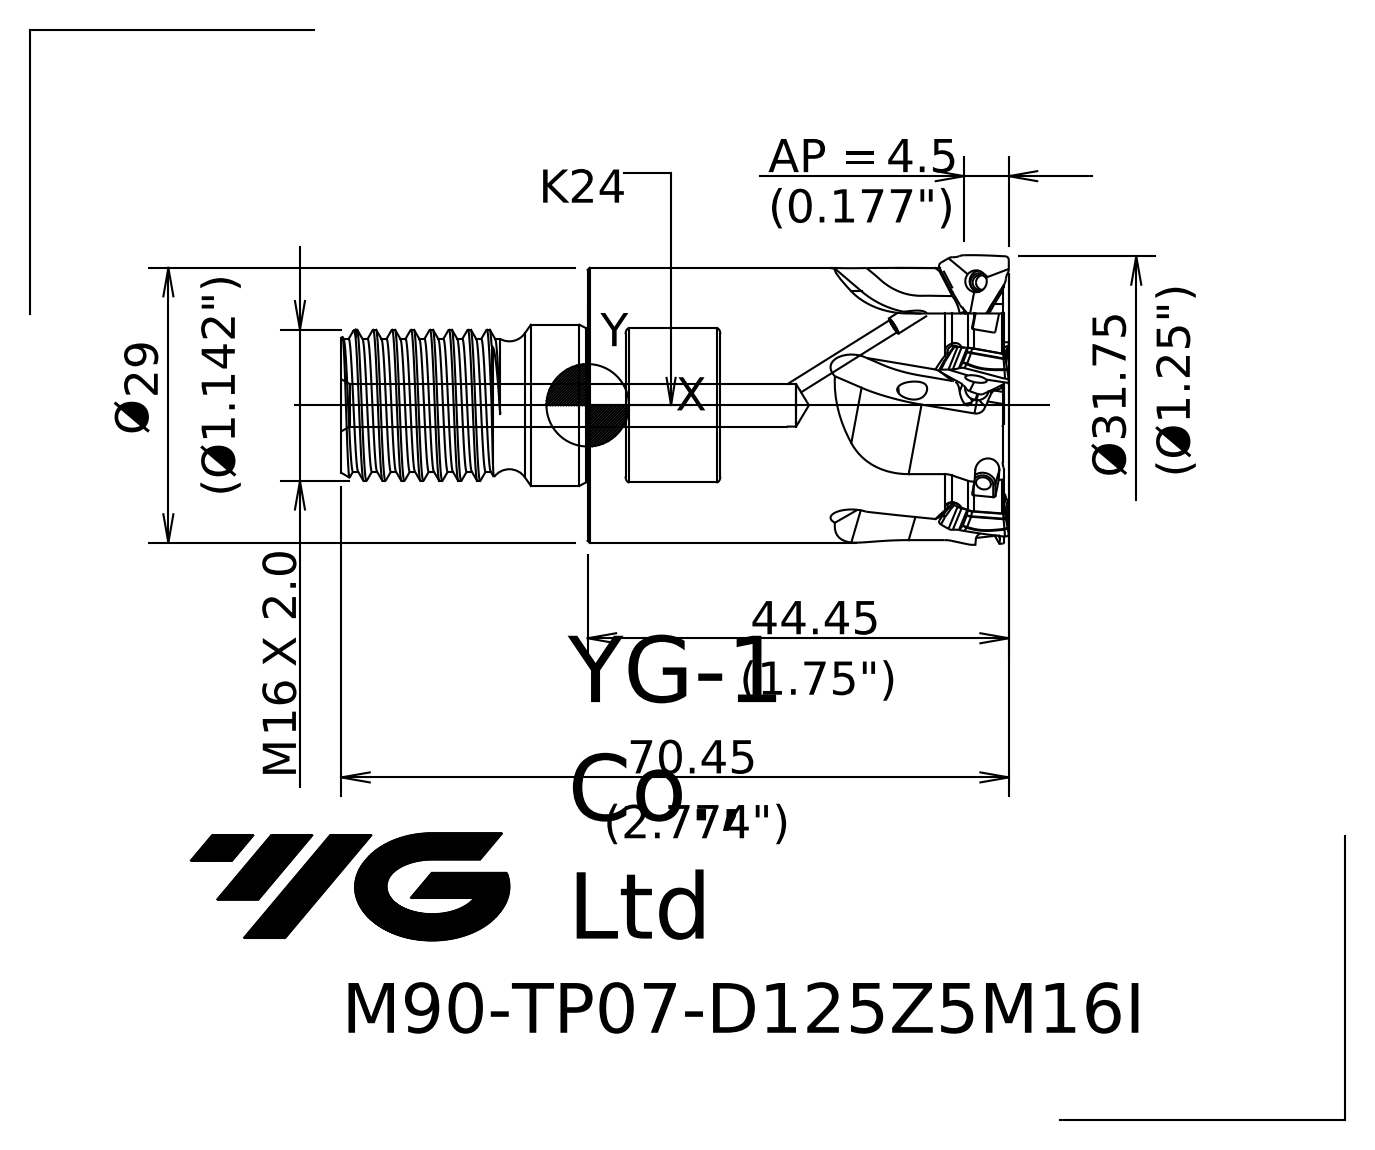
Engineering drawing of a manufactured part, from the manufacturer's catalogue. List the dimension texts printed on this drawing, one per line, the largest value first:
70.45
44.45
Ø31.75
4.5 AP =
M X 2.0 16
